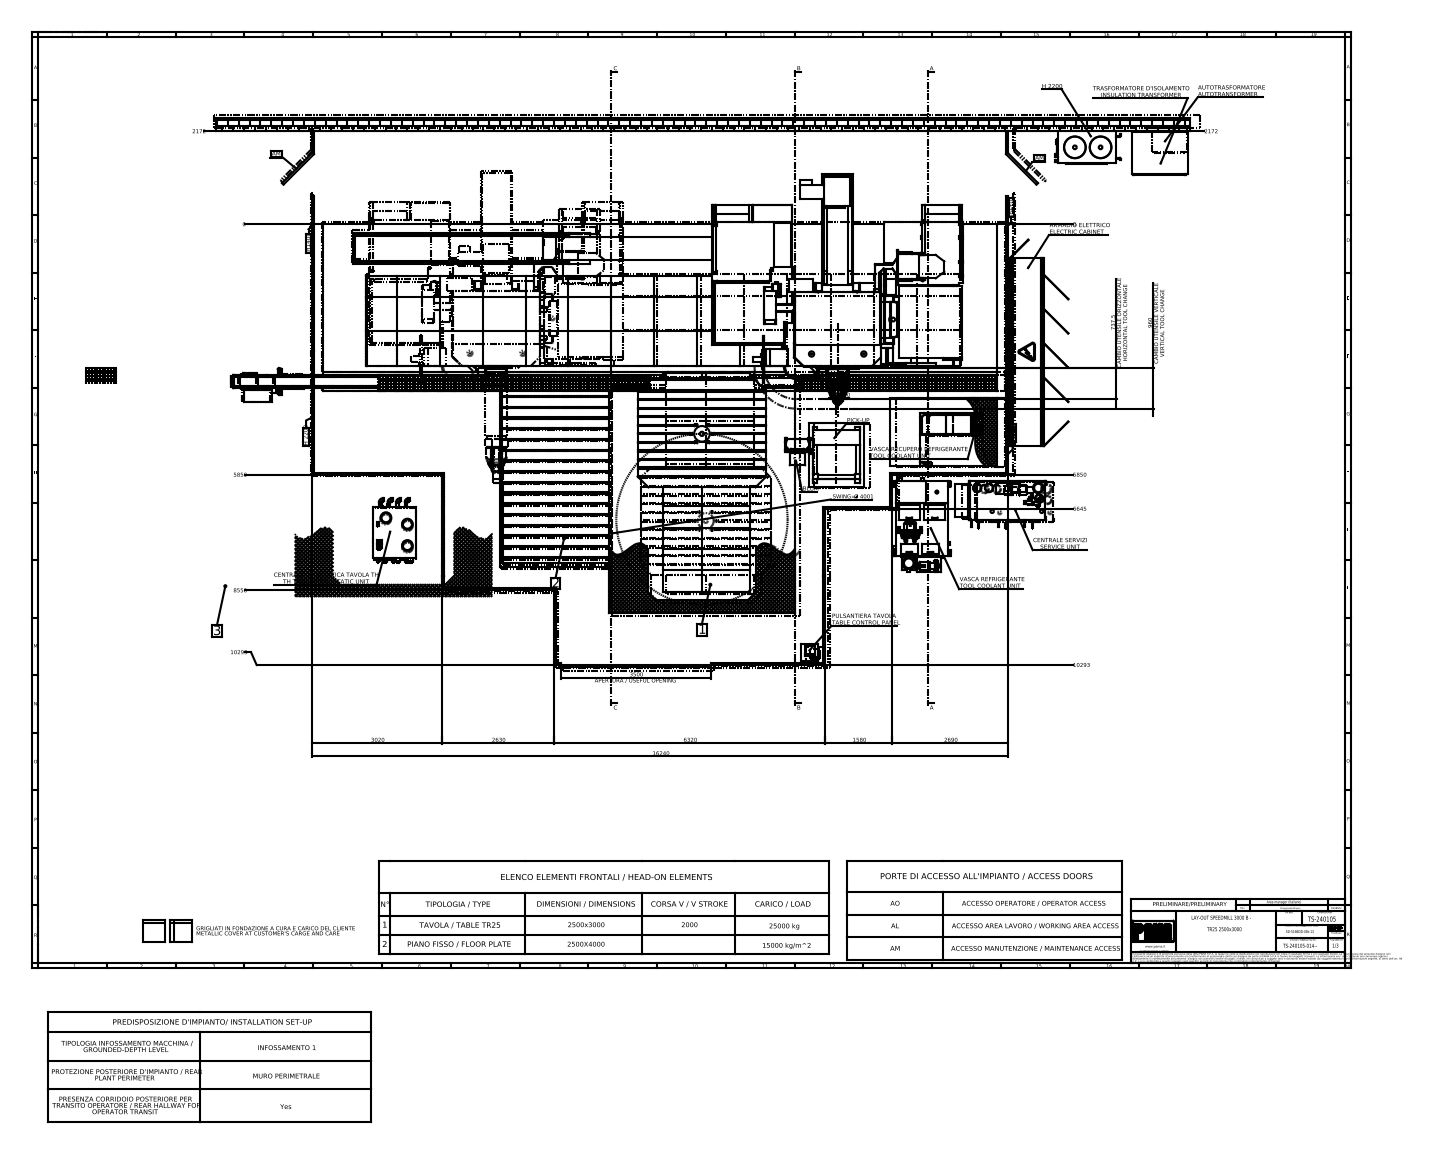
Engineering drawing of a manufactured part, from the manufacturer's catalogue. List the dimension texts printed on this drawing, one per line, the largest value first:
16240
10293
10293
8550
6645
6320
5850
5850
SWING= Ø 4001
3500 APERTURA / USEFUL OPENING
3020
2690
2630
2172
2172
1580
960 CAMBIO UTENSILE VERTICALE VERTICAL TOOL CHANGE
737,5 CAMBIO UTENSILE ORIZZONTALE HORIZONTAL TOOL CHANGE
30
0
0
